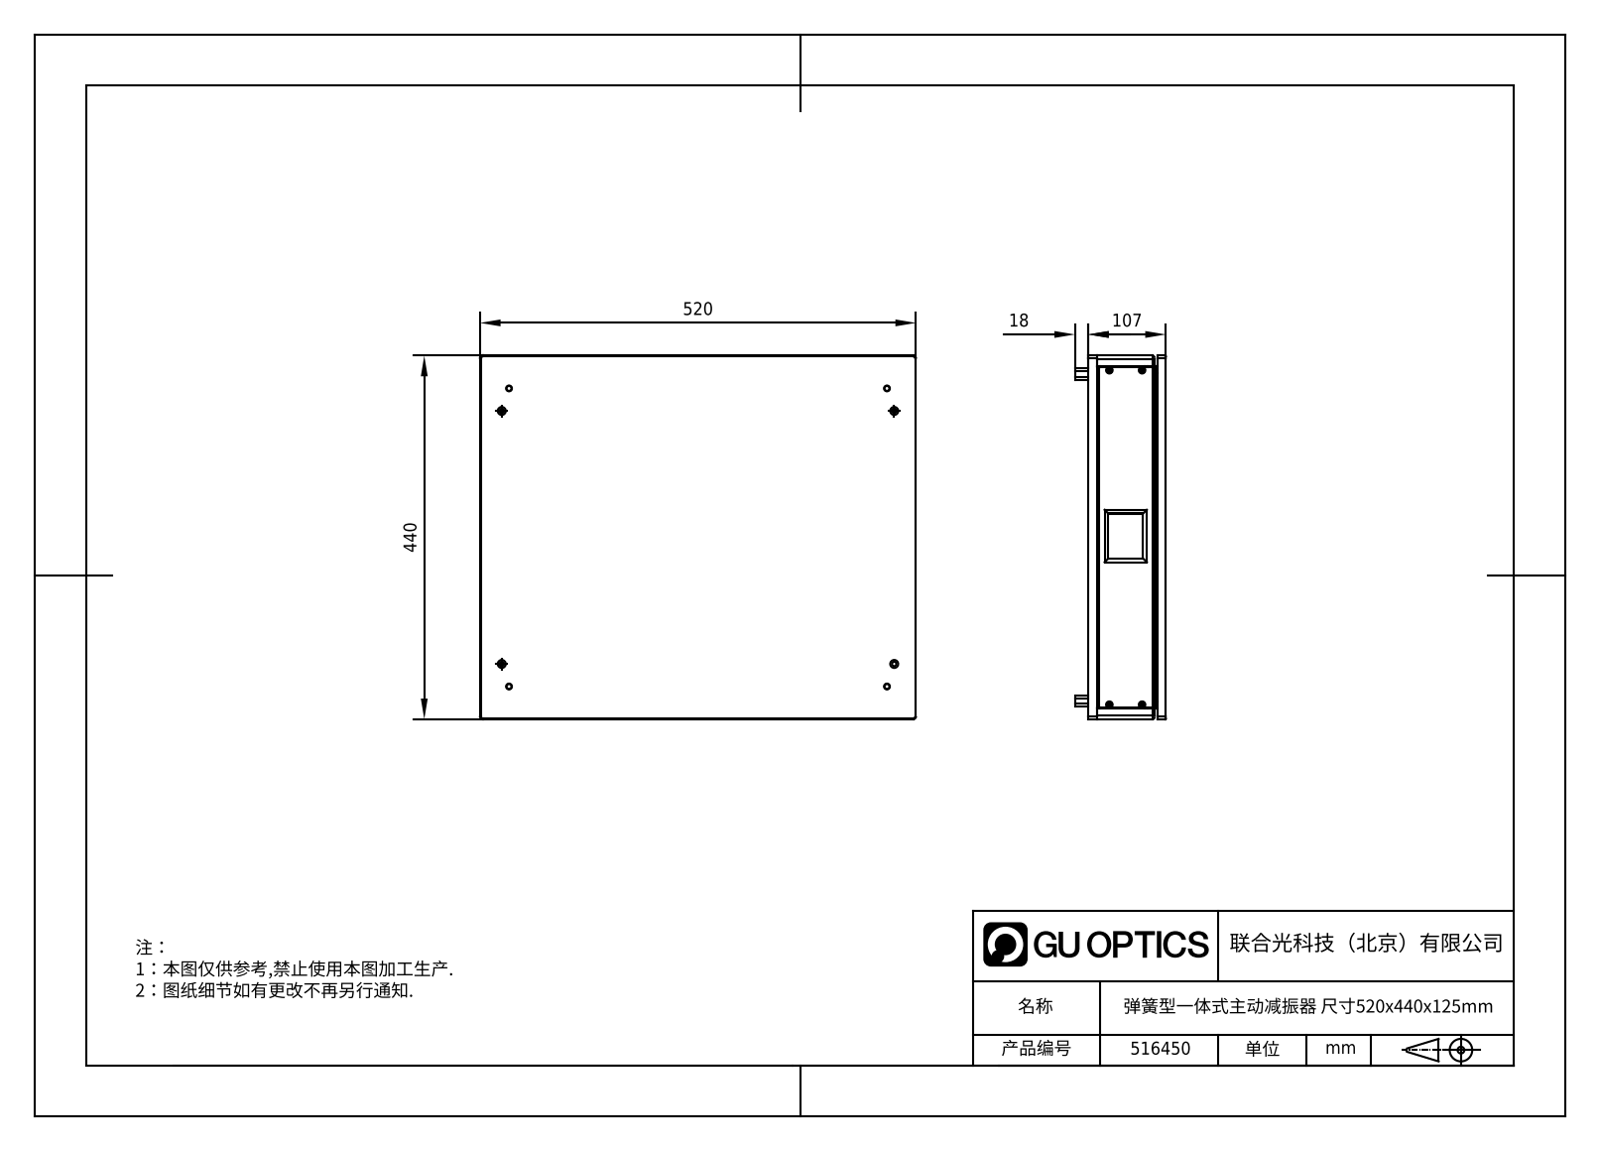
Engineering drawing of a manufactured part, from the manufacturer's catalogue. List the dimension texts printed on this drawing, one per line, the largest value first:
520
440
107
18
